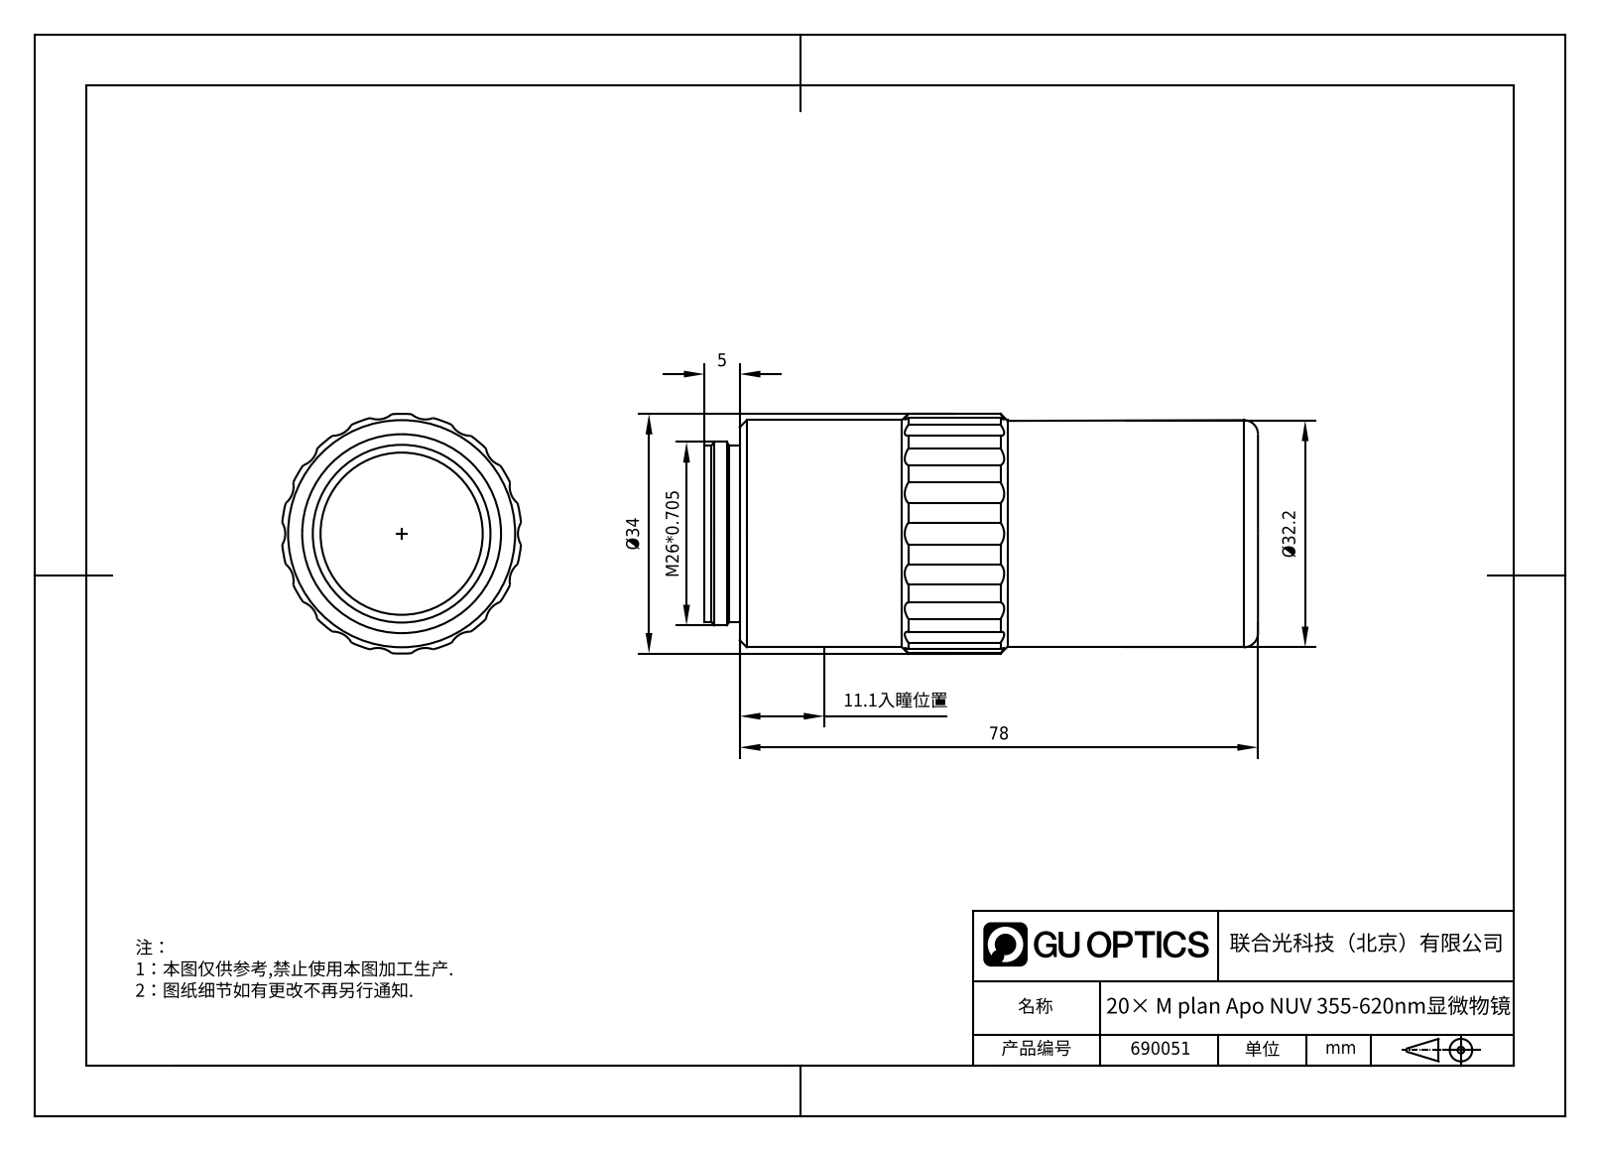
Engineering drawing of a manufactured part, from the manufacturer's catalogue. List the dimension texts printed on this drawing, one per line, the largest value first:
78
Ø34
Ø32.2
M26*0.705
11.1入瞳位置
5
